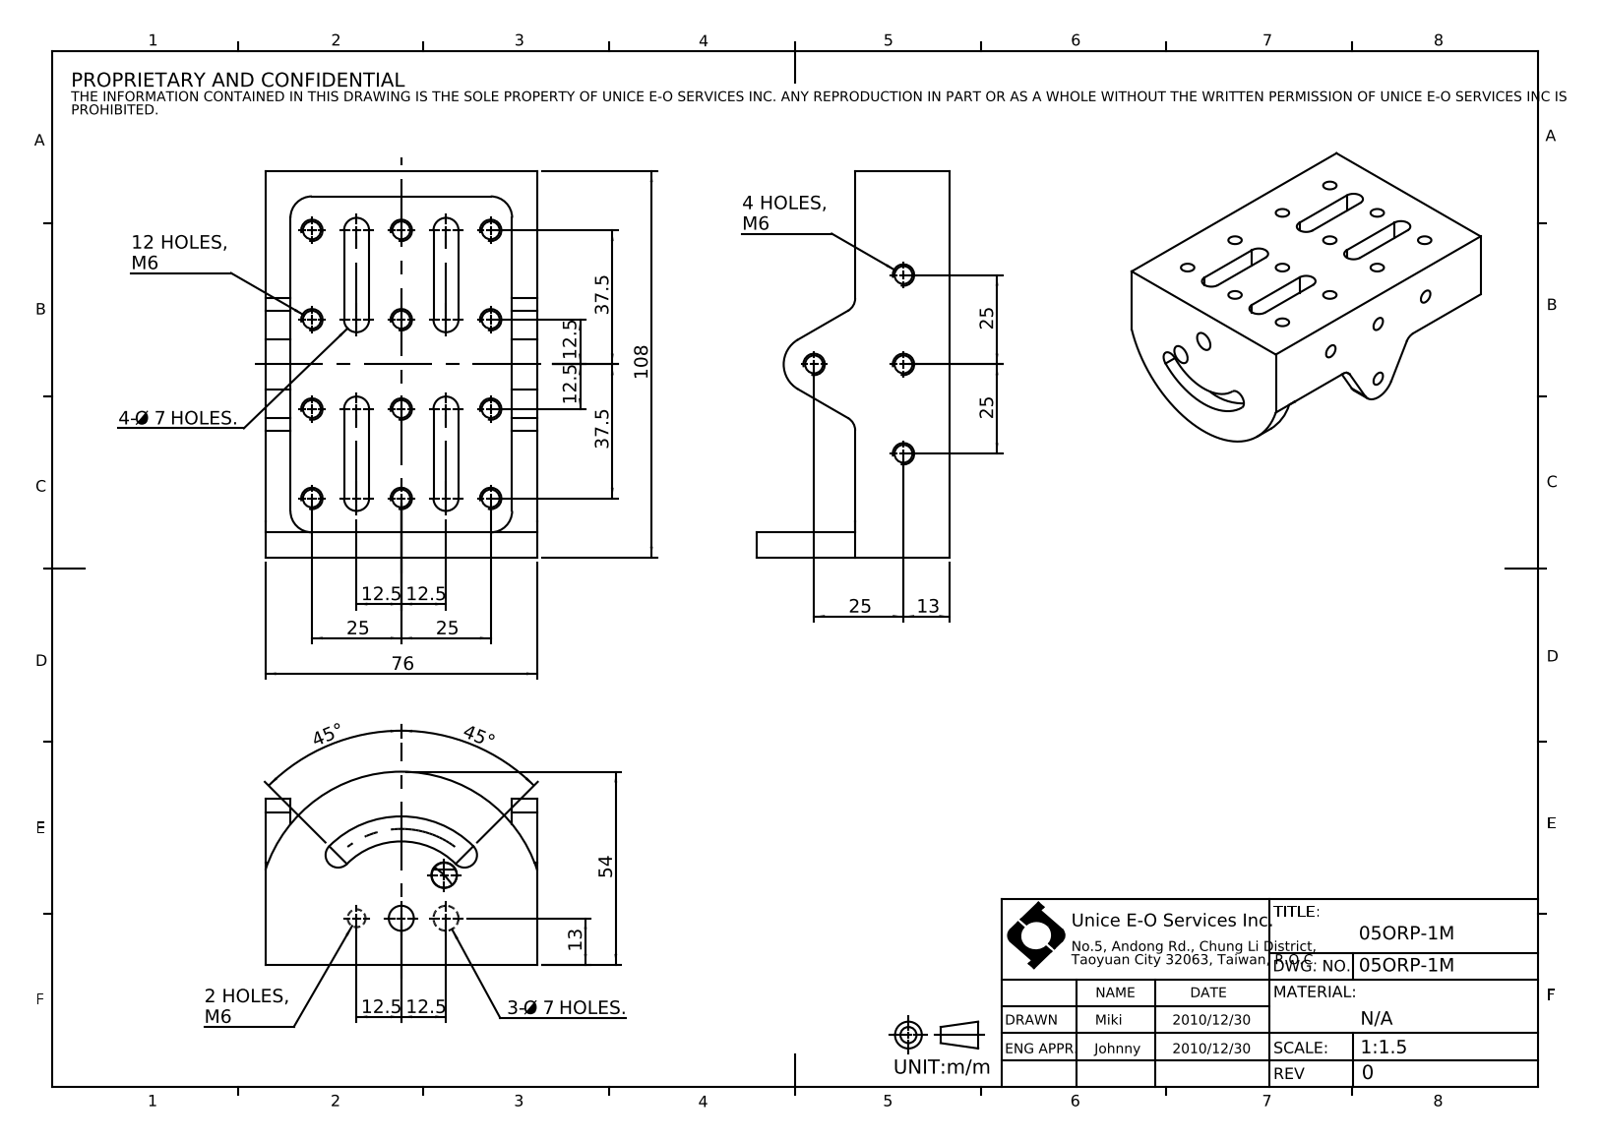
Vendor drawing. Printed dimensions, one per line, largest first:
108
76
54
45°
45°
37.5
37.5
25
25
25
25
25
13
13
12.5
12.5
12.5
12.5
12.5
12.5
12 HOLES, M6
4- Ø 7 HOLES.
3- Ø 7 HOLES.
2 HOLES, M6
